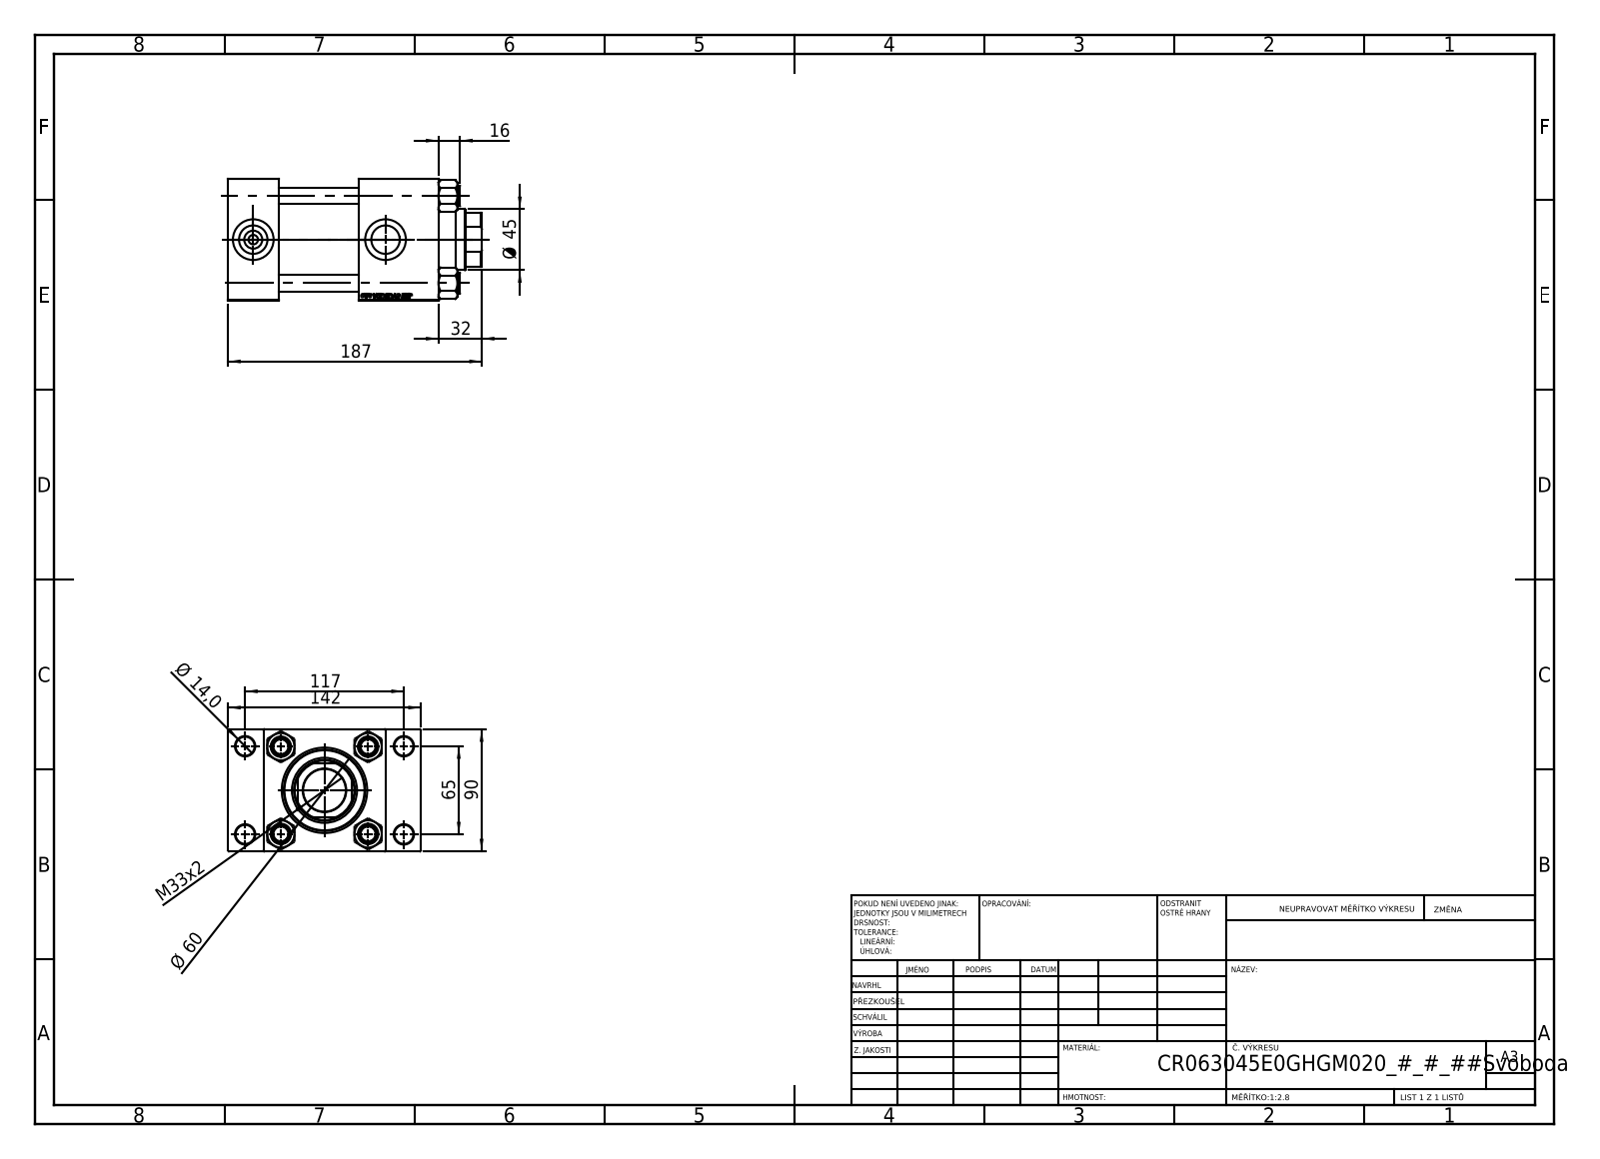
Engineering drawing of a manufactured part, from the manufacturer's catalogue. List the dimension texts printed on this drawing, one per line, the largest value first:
187
142
117
90
65
Ø 60
Ø 45
M33x2
32
16
Ø 14,0
